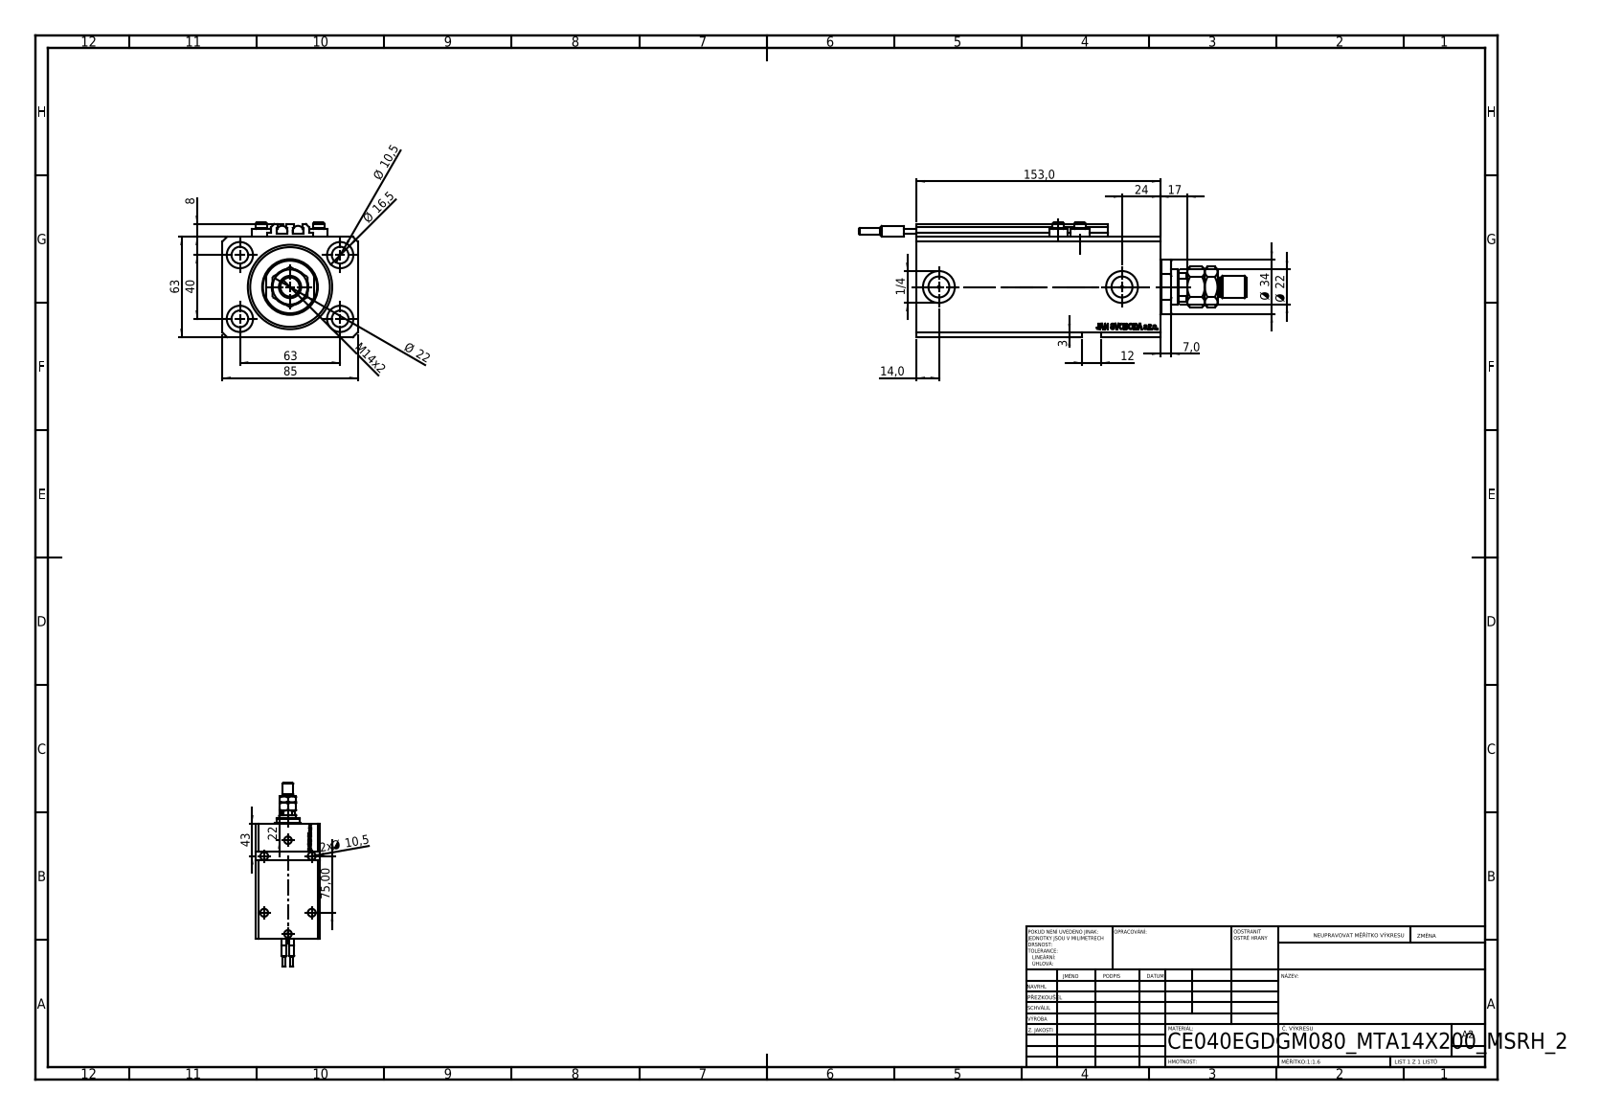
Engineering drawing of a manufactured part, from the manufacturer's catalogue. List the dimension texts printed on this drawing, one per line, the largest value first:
153,0
85
75,00
63
63
43
40
Ø 34
24
Ø 22
Ø 22
22
17
Ø 16,5
M14x2
14,0
12
Ø 10,5
2x Ø 10,5
8
7,0
3
1/4
